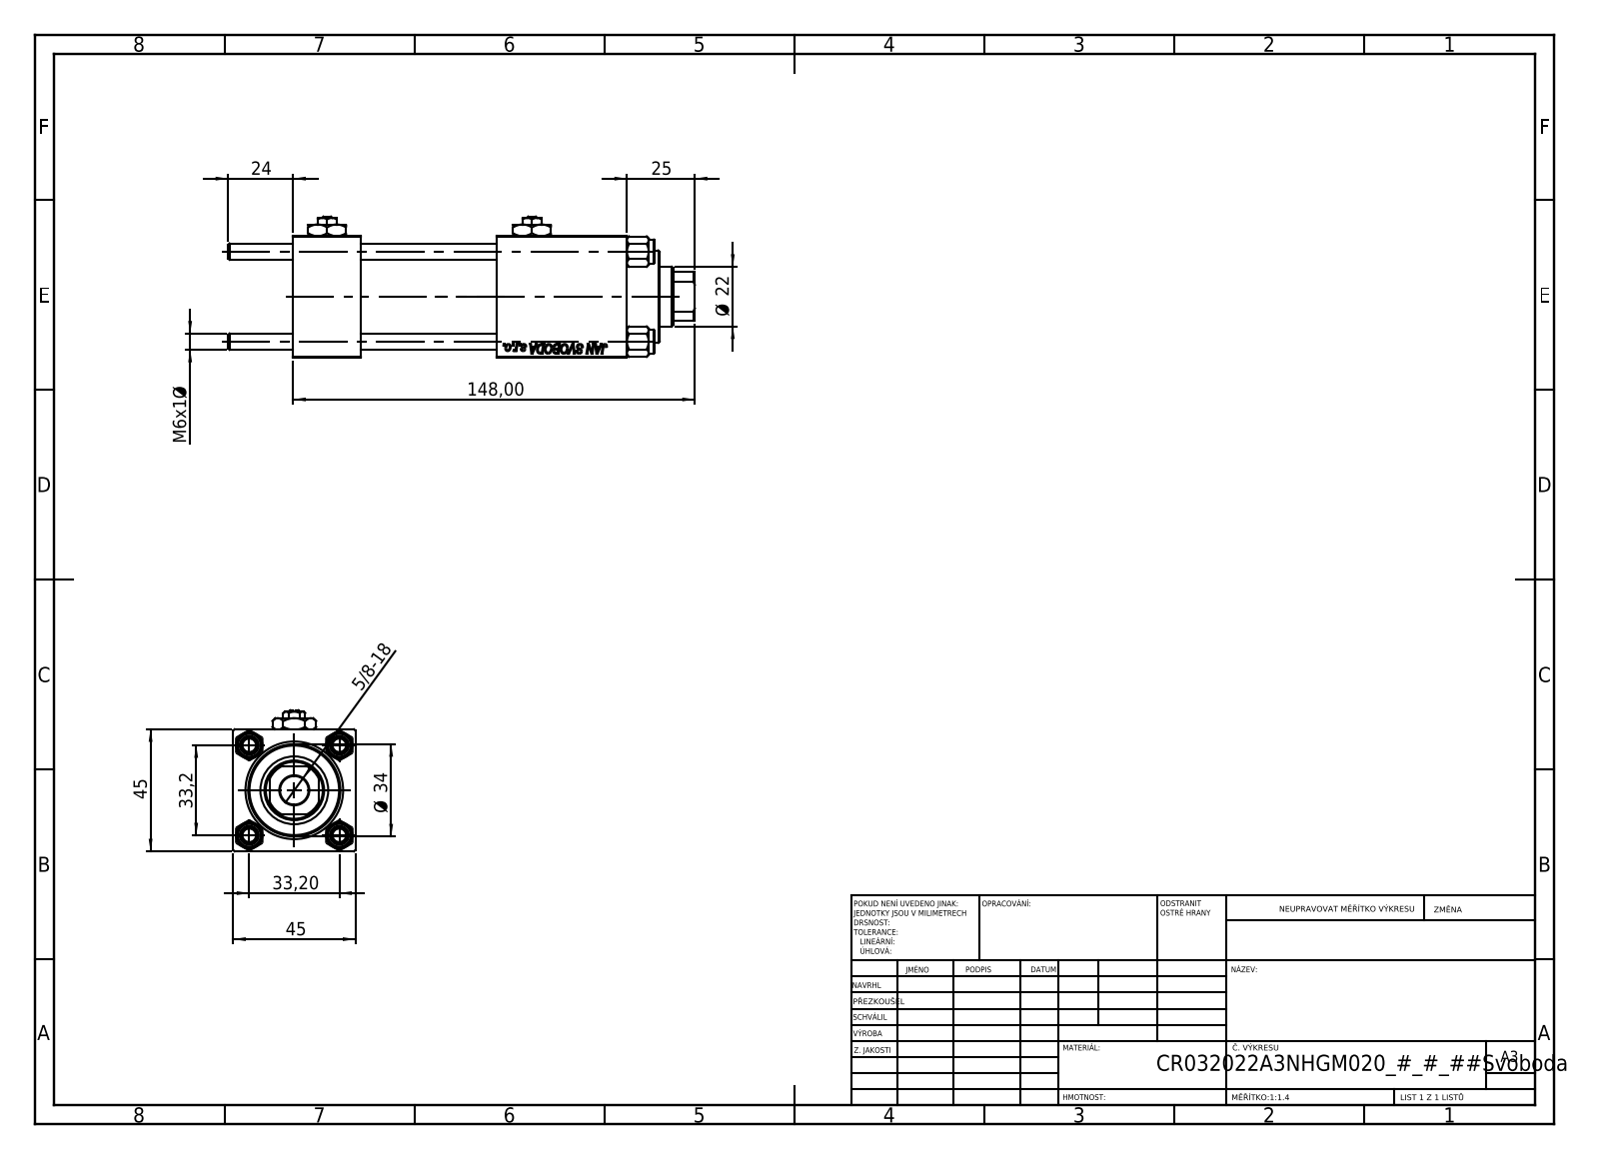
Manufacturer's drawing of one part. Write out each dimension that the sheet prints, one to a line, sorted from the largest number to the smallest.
148,00
45
45
Ø 34
33,2
33,20
25
24
Ø 22
M6x1 Ø
5/8-18
